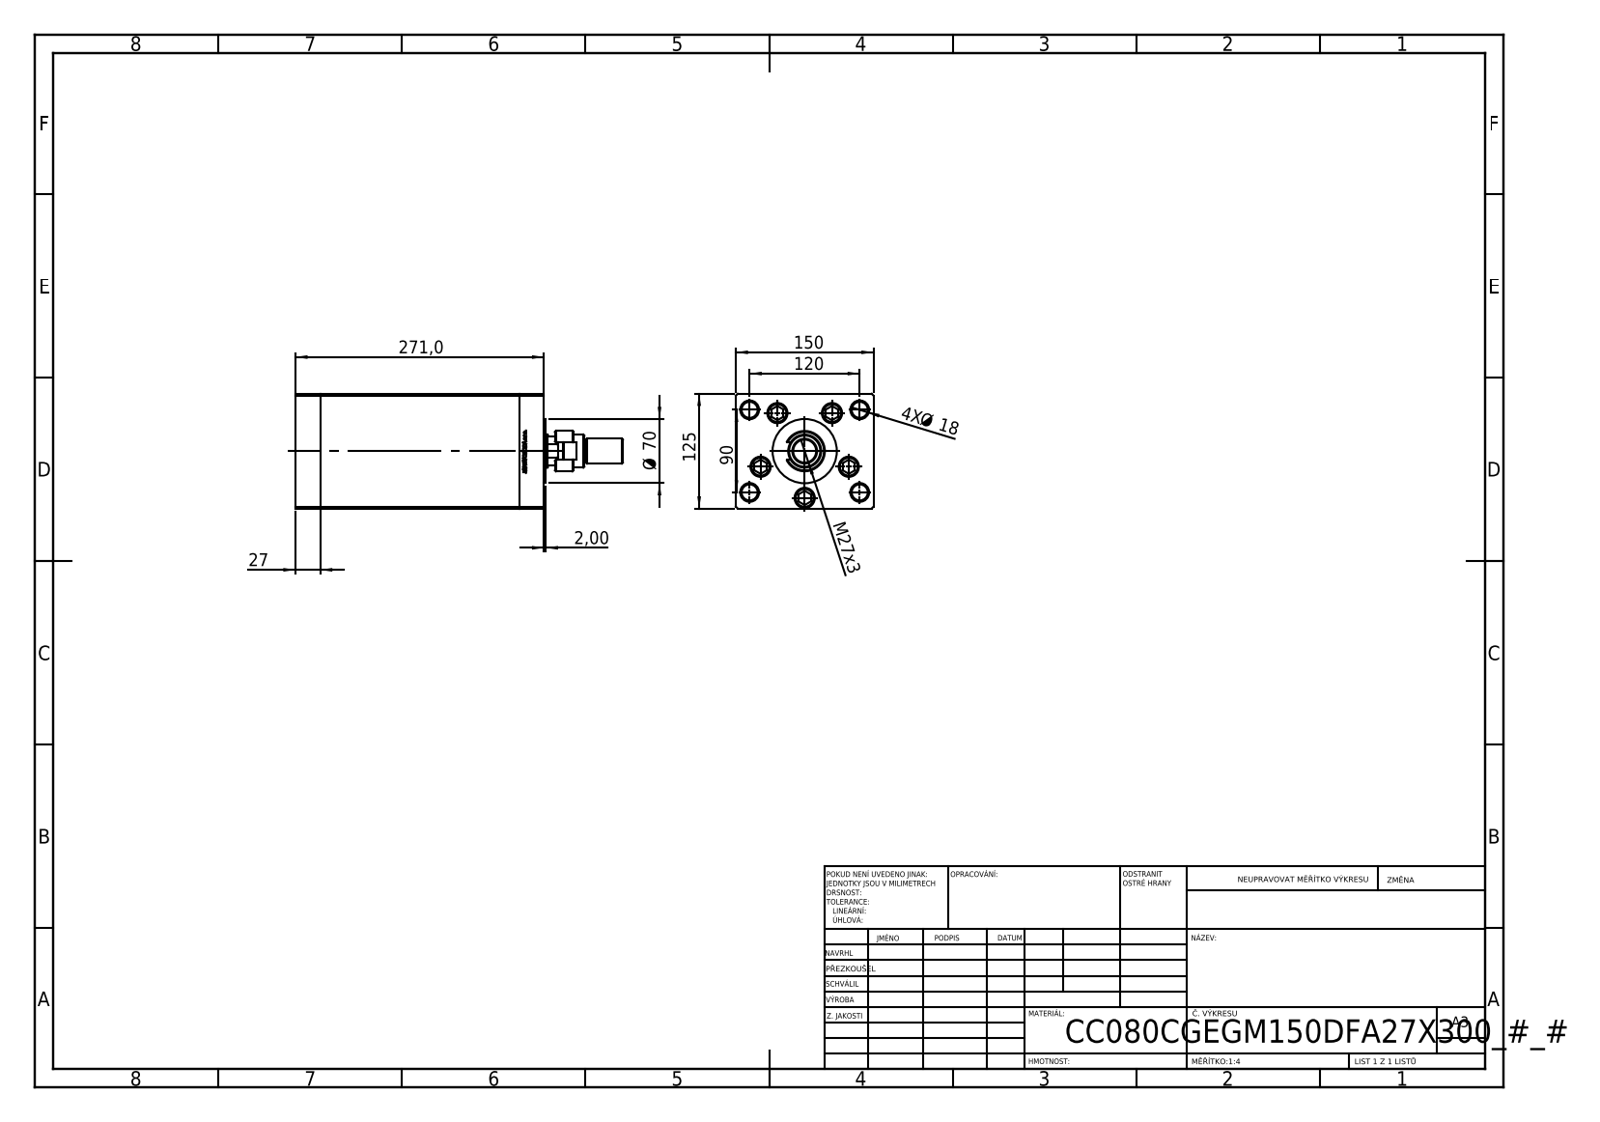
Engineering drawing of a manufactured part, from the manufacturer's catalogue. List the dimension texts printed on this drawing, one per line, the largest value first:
271,0
150
125
120
90
Ø 70
27
M27x3
4X Ø 18
2,00
